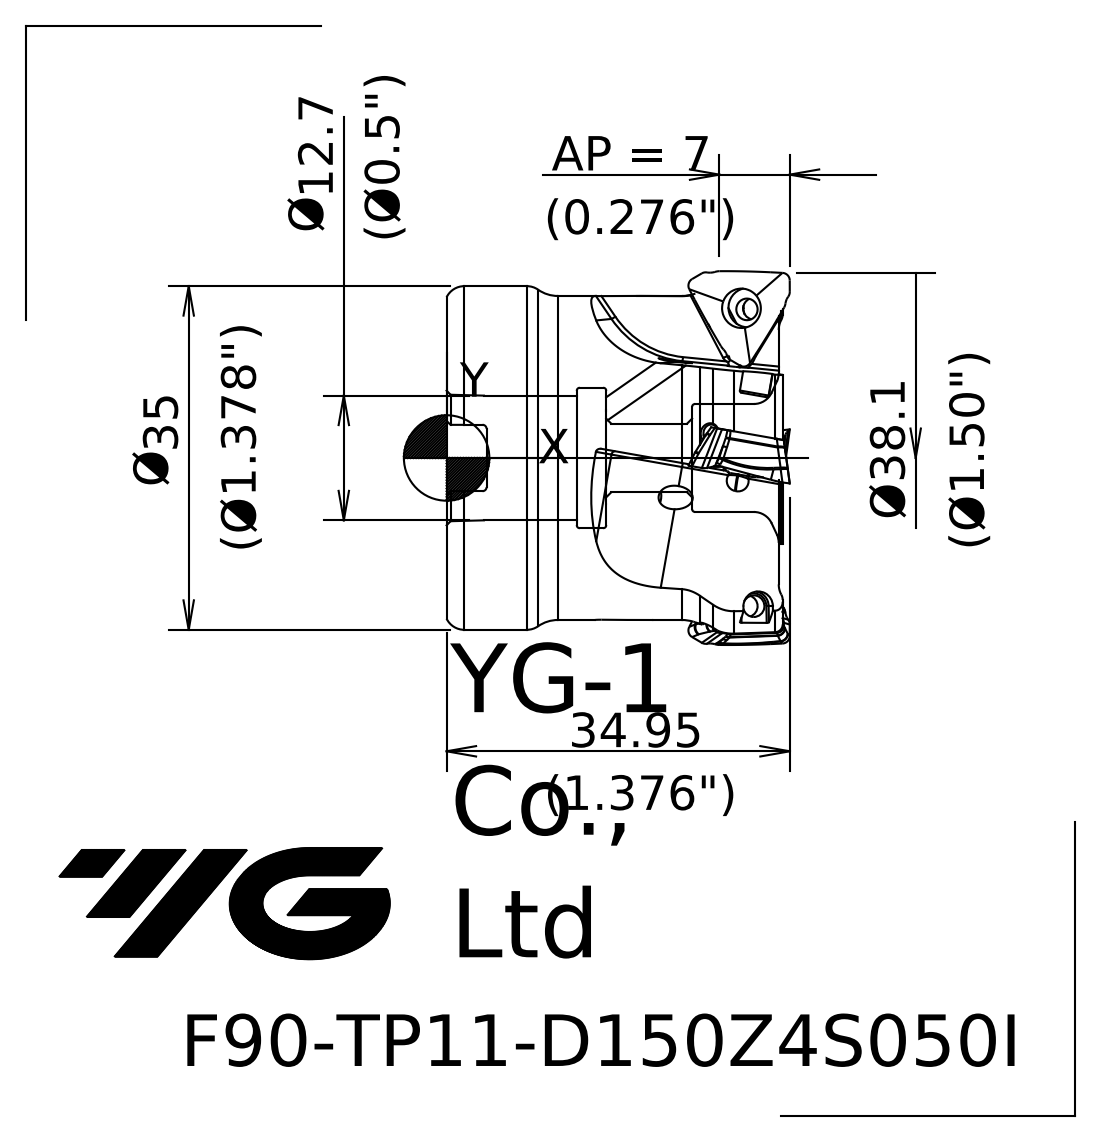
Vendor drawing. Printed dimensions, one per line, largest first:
Ø 35
34.95
Ø 12.7
AP = 7
